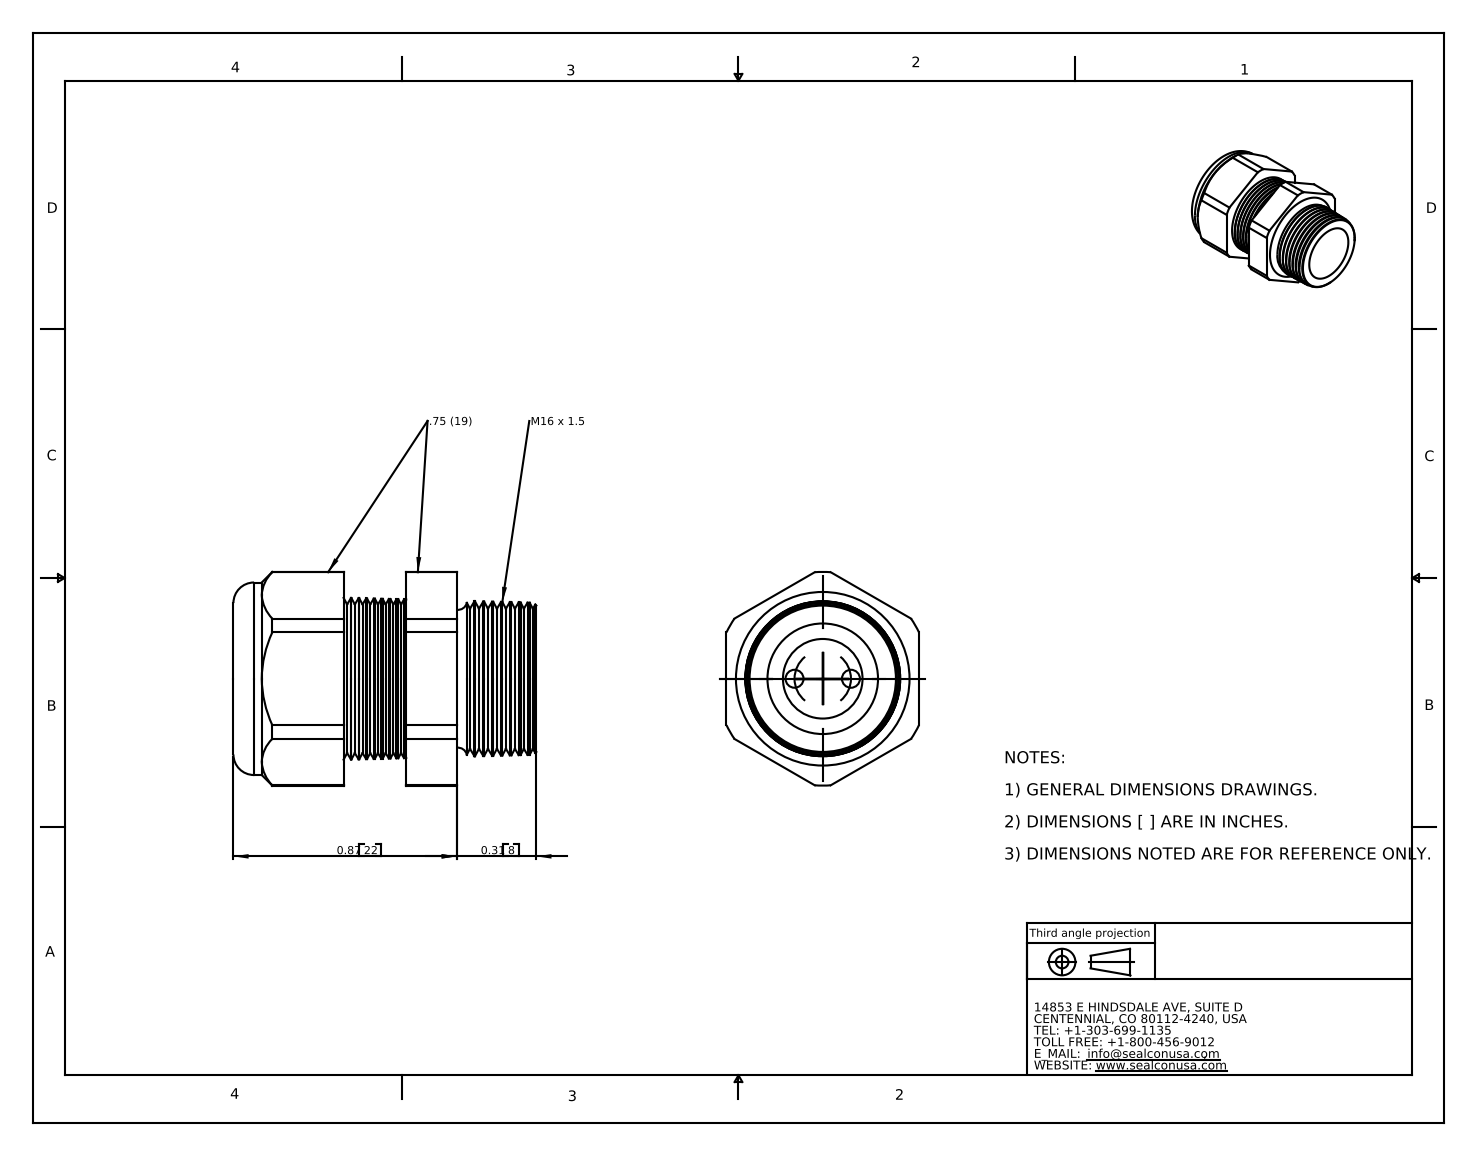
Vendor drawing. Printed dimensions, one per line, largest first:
0.87 22
0.31 8
